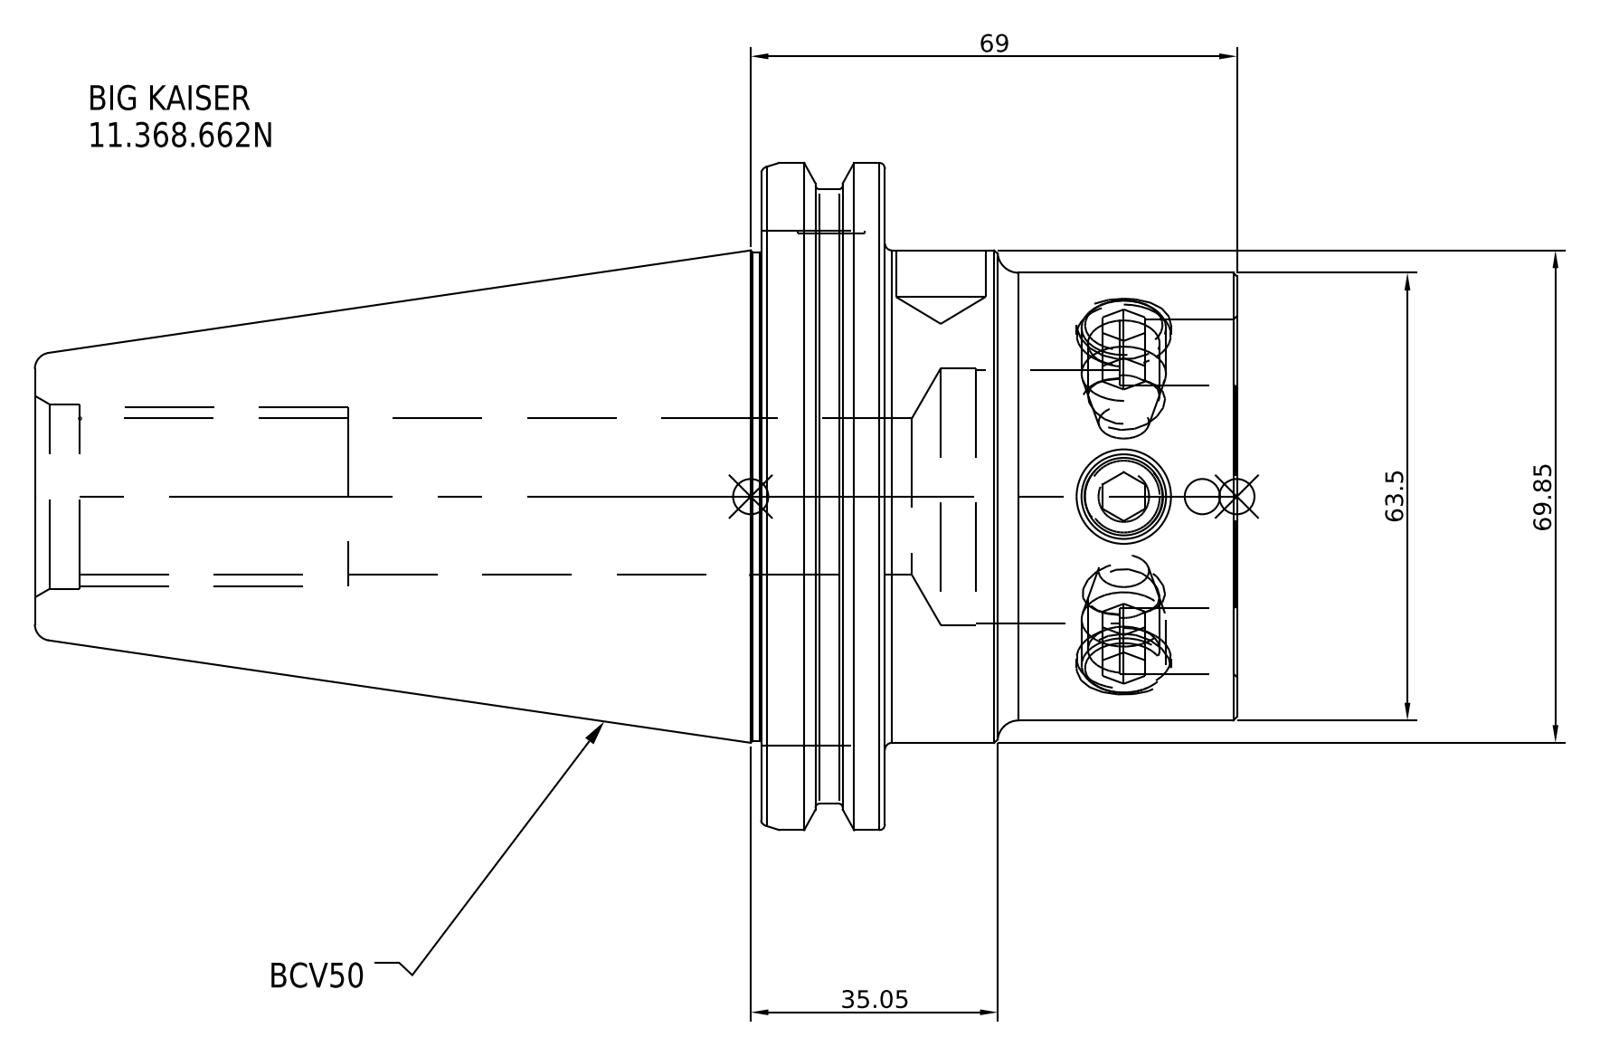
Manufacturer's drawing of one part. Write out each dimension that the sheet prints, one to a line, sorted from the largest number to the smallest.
69.85
69
63.5
35.05
